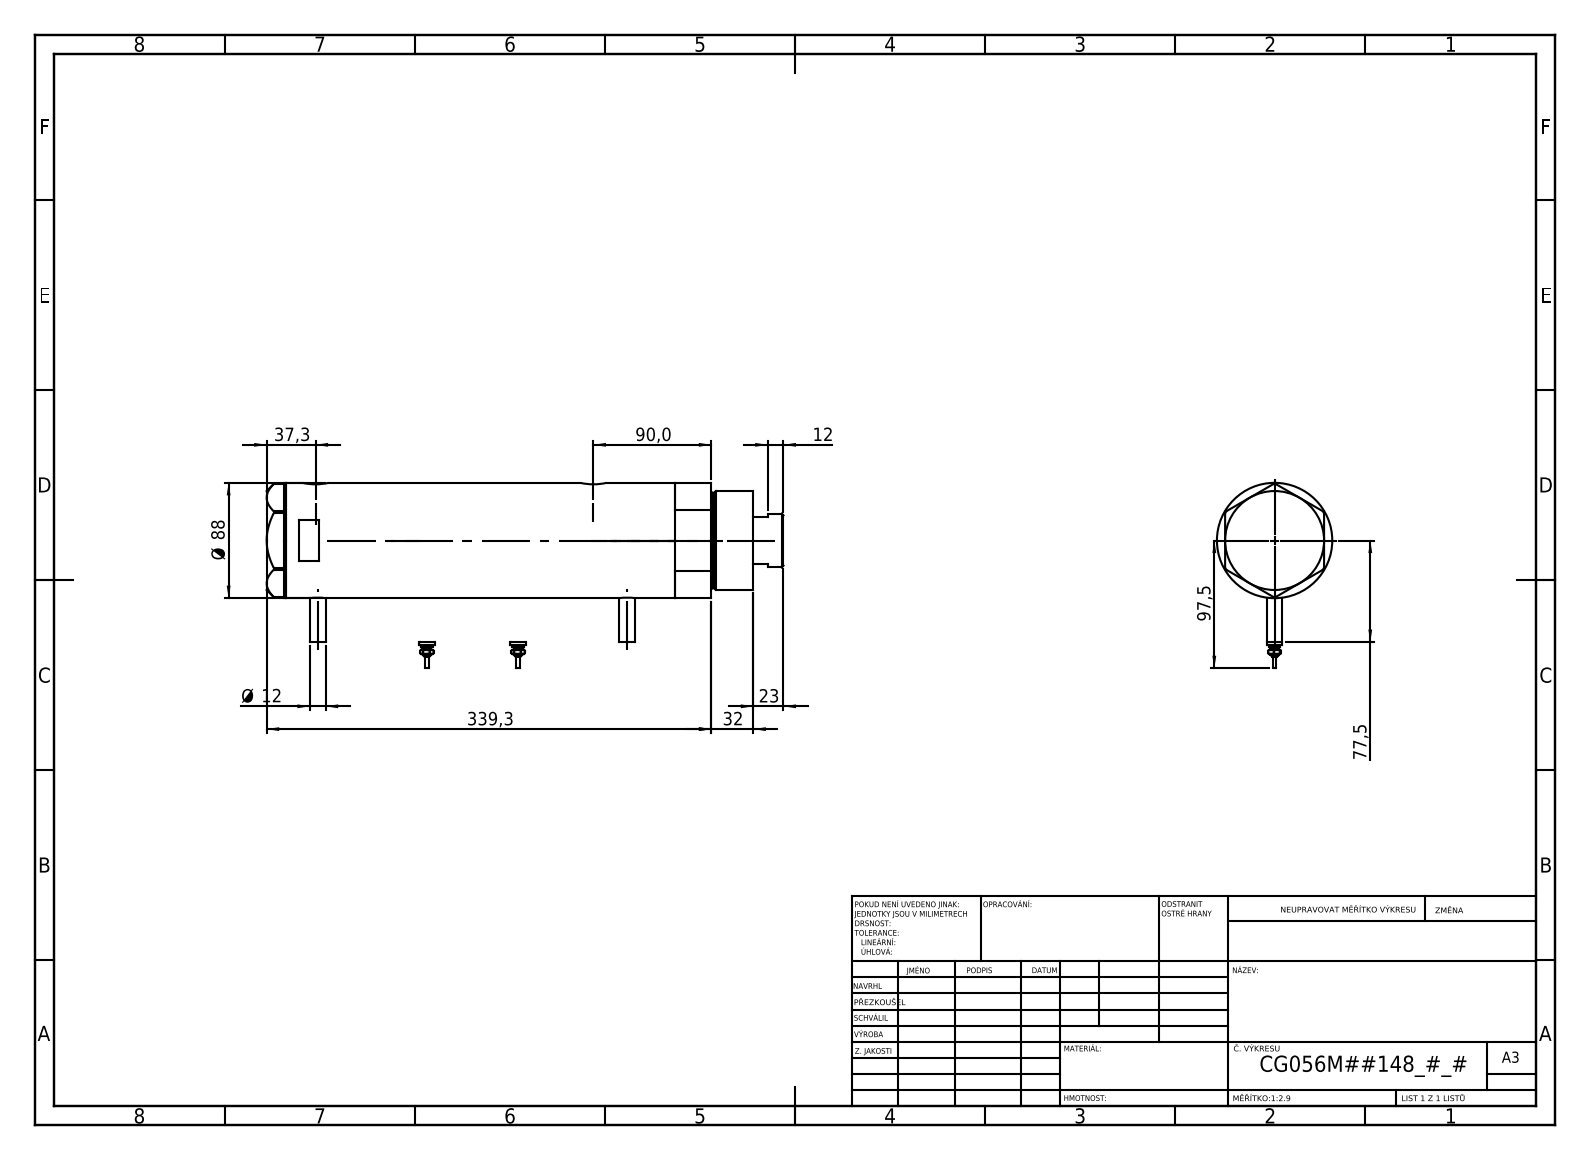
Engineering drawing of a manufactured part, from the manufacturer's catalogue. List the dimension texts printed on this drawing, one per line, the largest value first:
339,3
97,5
90,0
Ø 88
77,5
37,3
32
23
12
Ø 12
